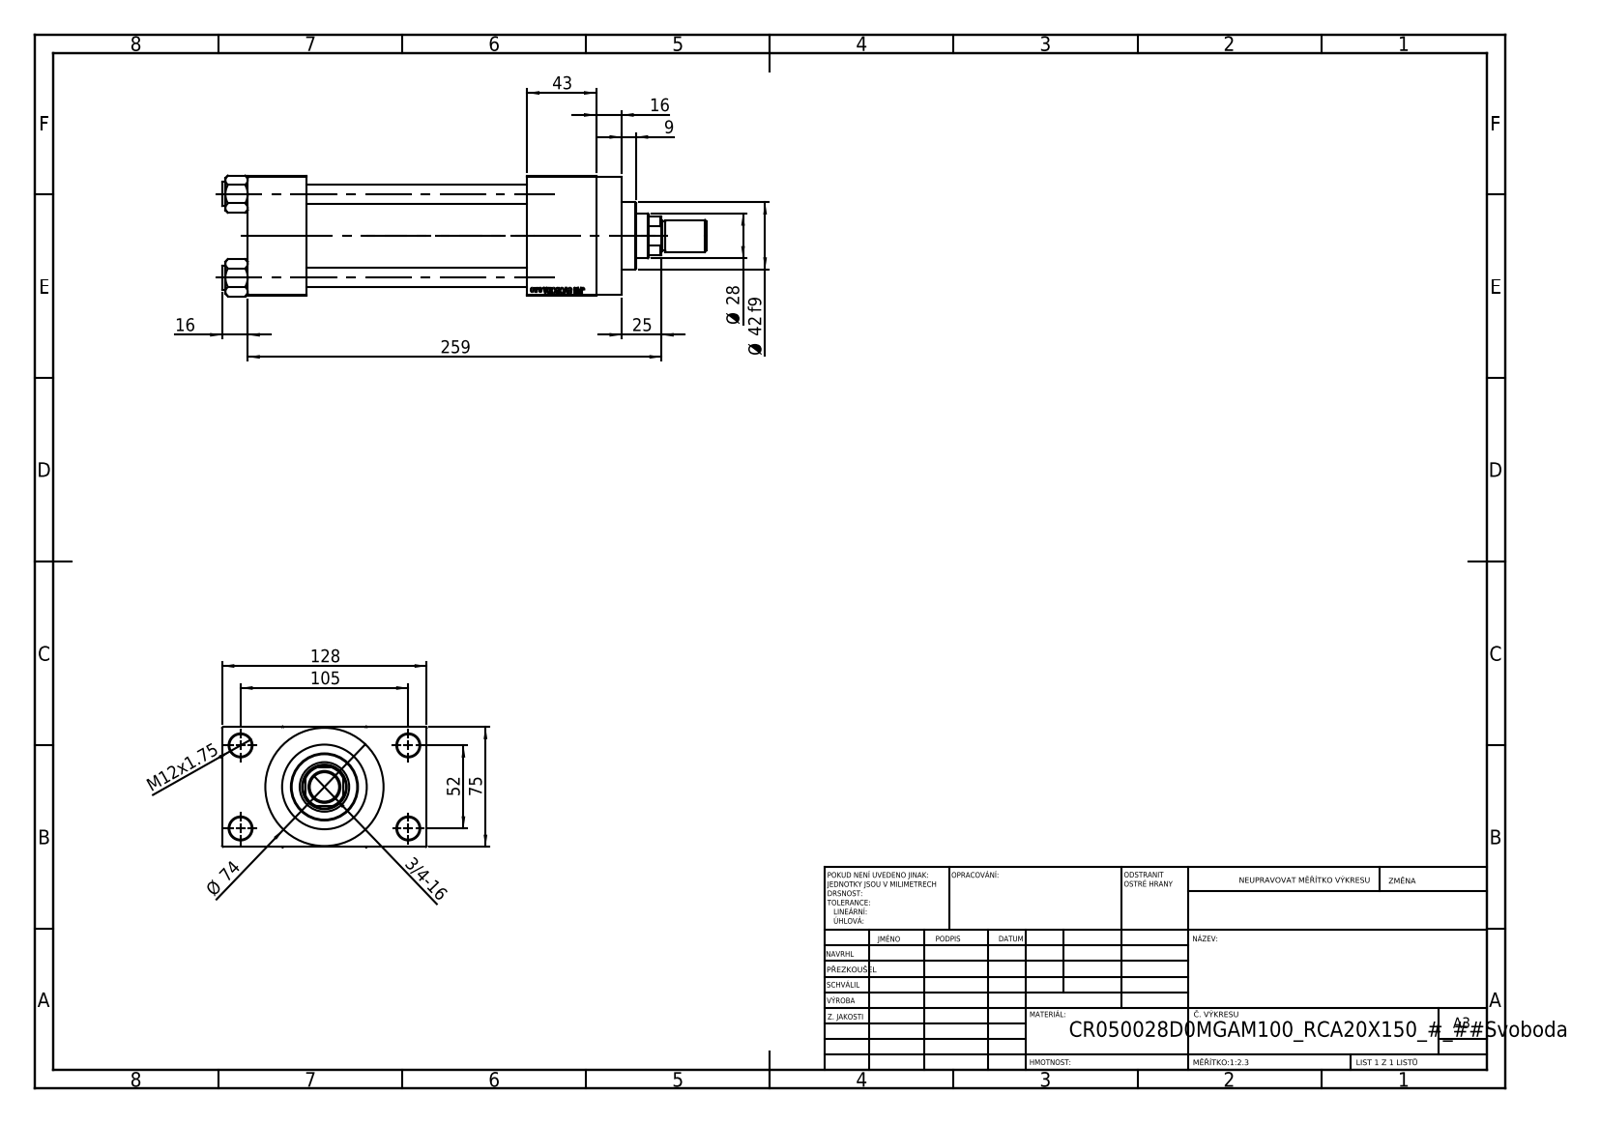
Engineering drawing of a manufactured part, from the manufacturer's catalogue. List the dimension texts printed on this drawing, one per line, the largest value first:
259
128
105
75
Ø 74
52
43
Ø 42 f9
Ø 28
25
16
16
M12x1.75
9
3/4-16
